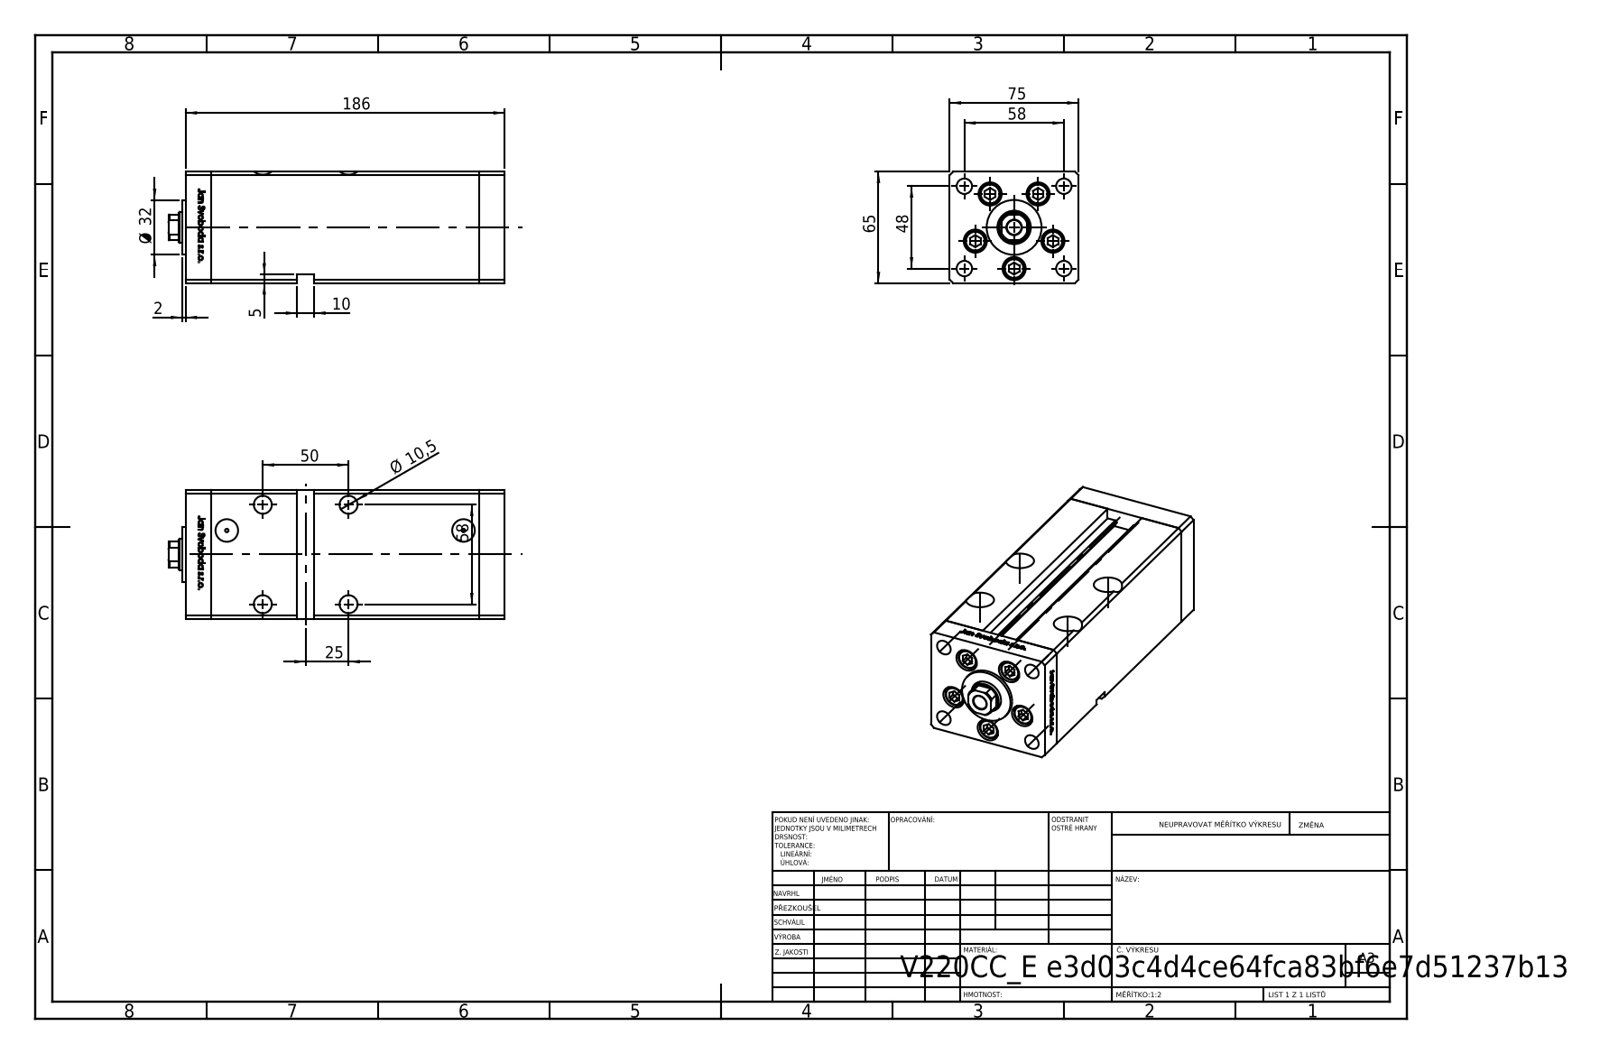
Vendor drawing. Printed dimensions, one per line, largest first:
186
75
65
58
58
50
48
Ø 32
25
Ø 10,5
10
5
2
